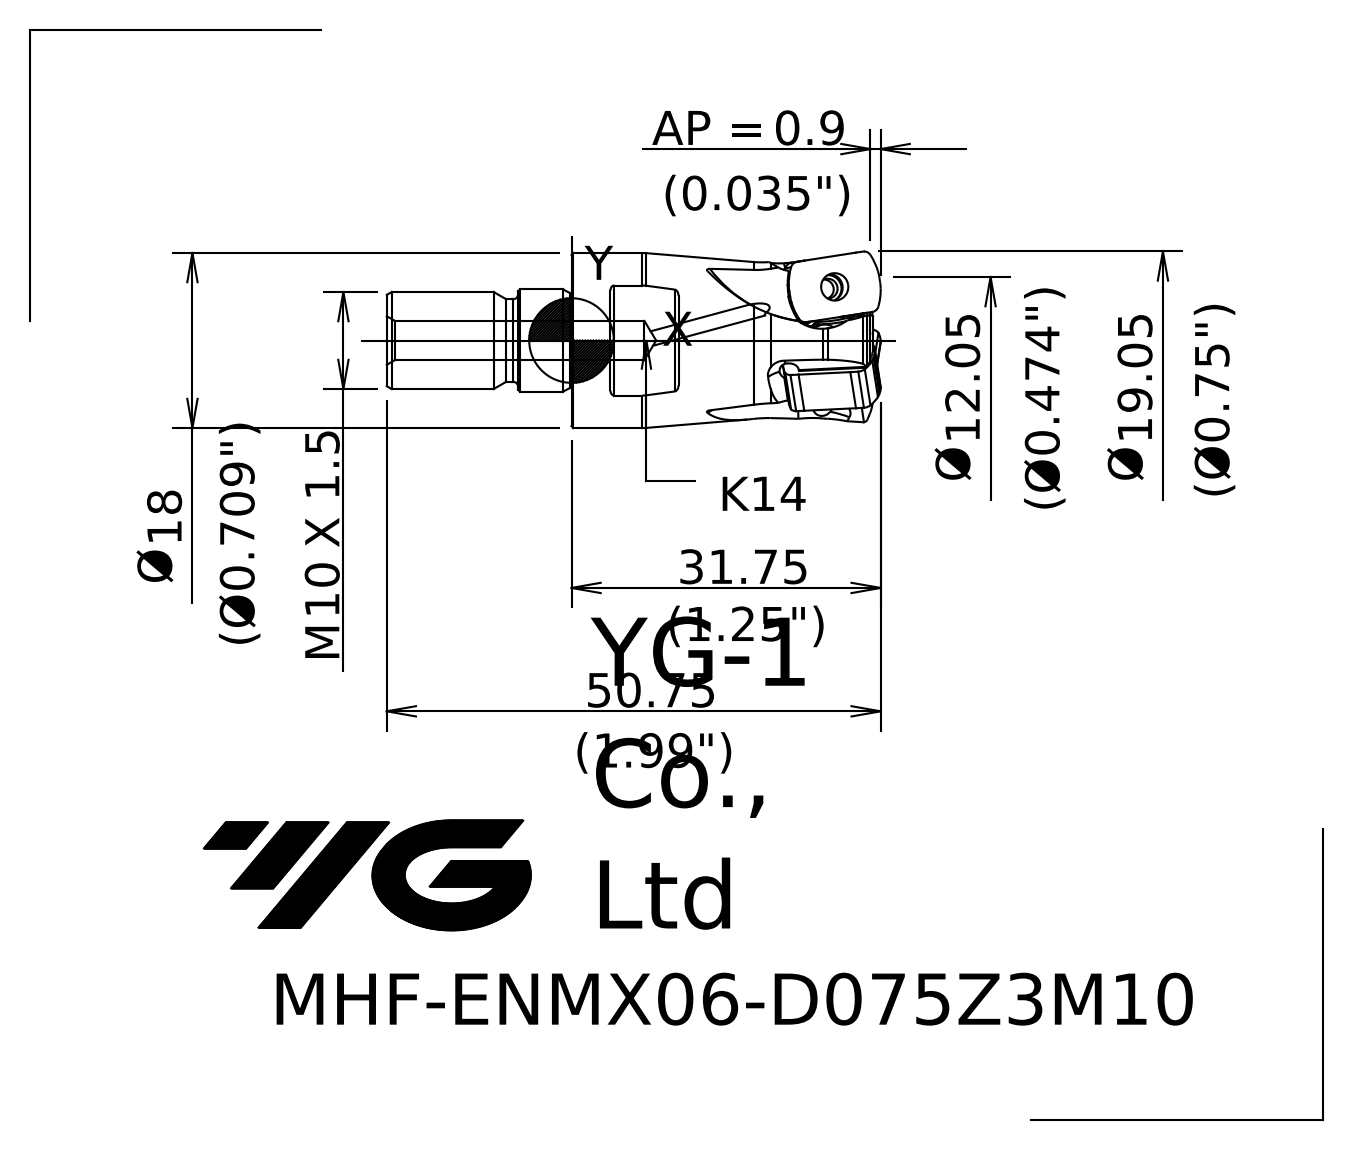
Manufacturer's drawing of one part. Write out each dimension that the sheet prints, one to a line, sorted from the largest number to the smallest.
18 Ø
12.05 Ø
M X 1.5 10
